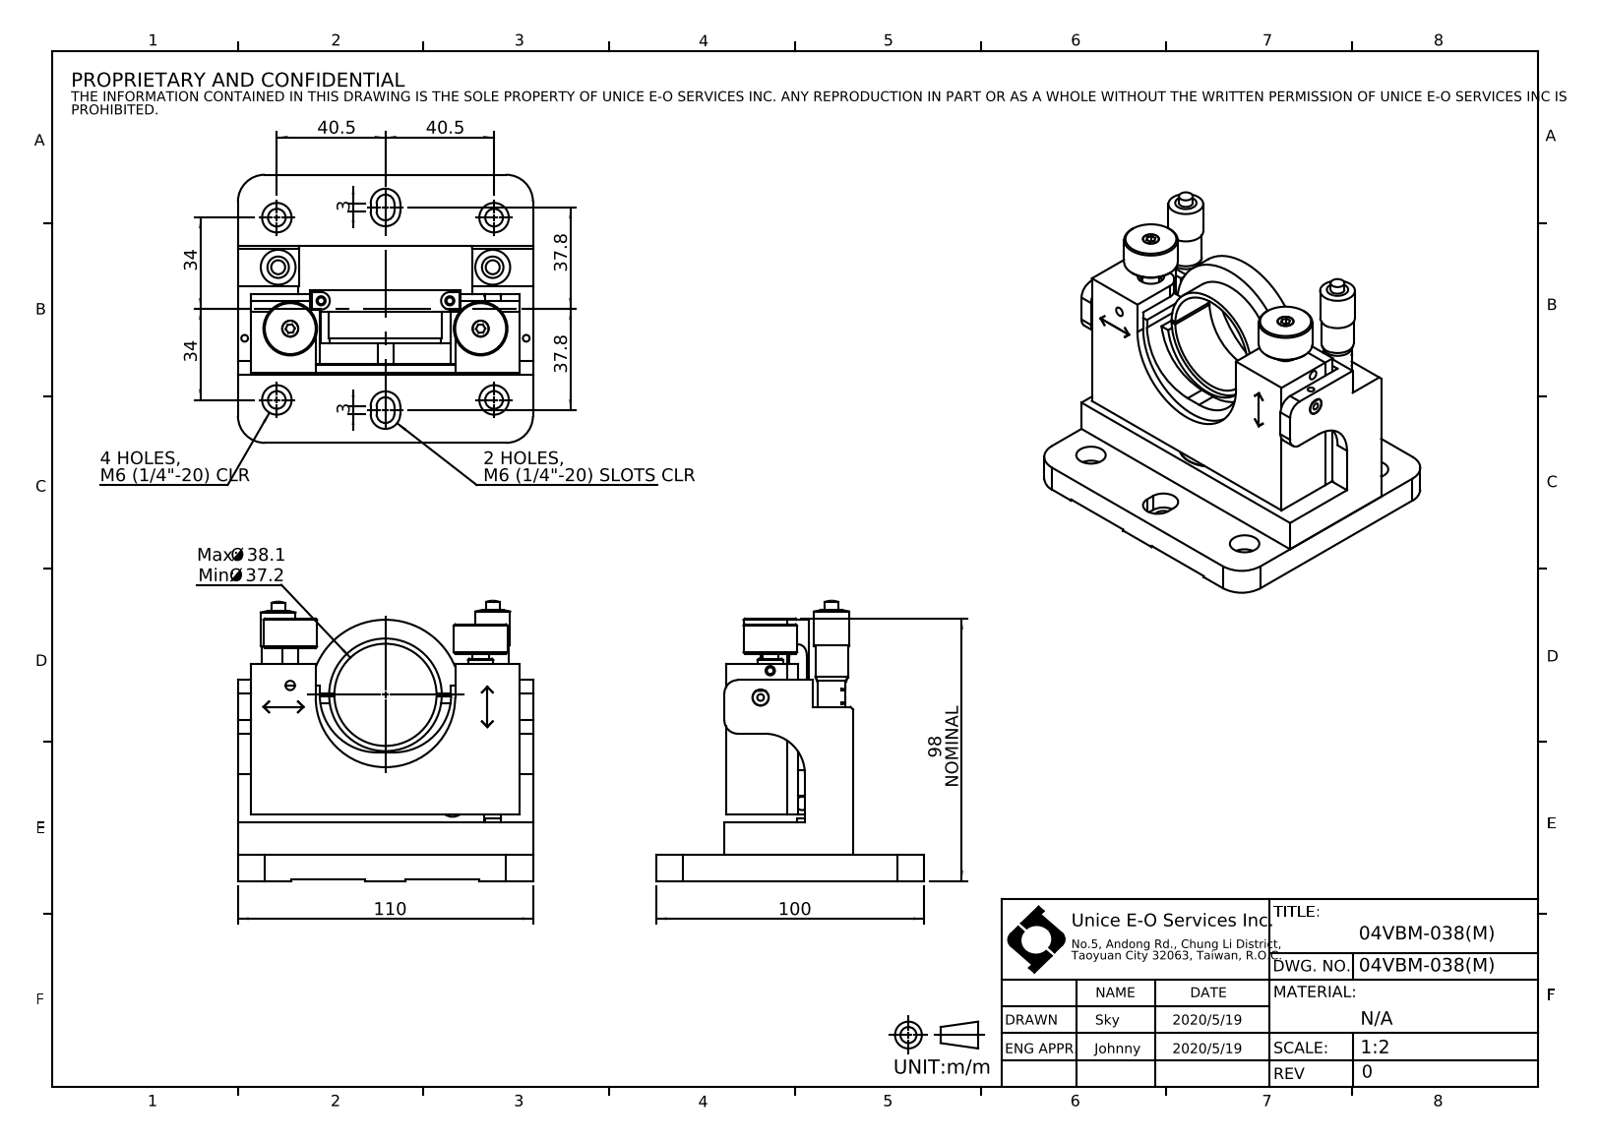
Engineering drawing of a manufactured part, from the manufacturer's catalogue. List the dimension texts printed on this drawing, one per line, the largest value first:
110
100
98 NOMINAL
40.5
40.5
Max: Ø 38.1 Min: Ø 37.2
37.8
37.8
34
34
4 HOLES, M6 (1/4"-20) CLR
3
3
2 HOLES, M6 (1/4"-20) SLOTS CLR
